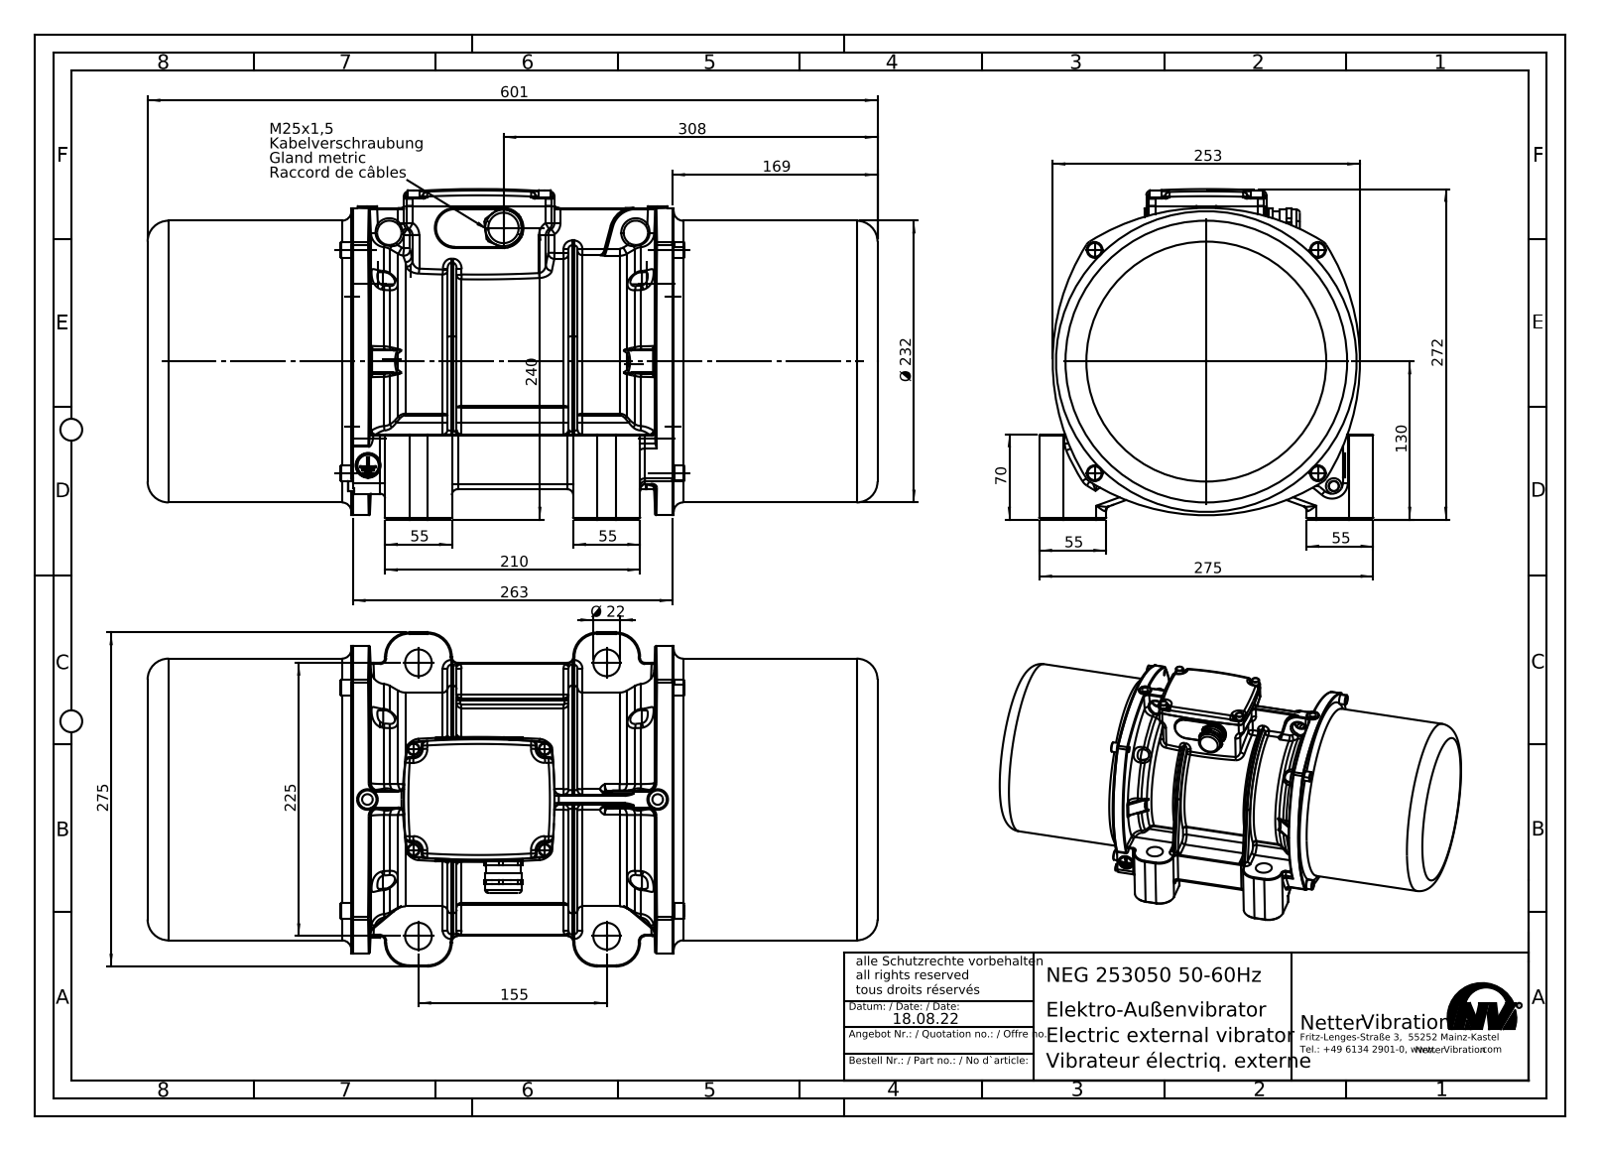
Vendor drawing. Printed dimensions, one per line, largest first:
601
308
275
275
272
263
253
240
Ø 232
225
210
169
155
130
70
55
55
55
55
Ø 22
